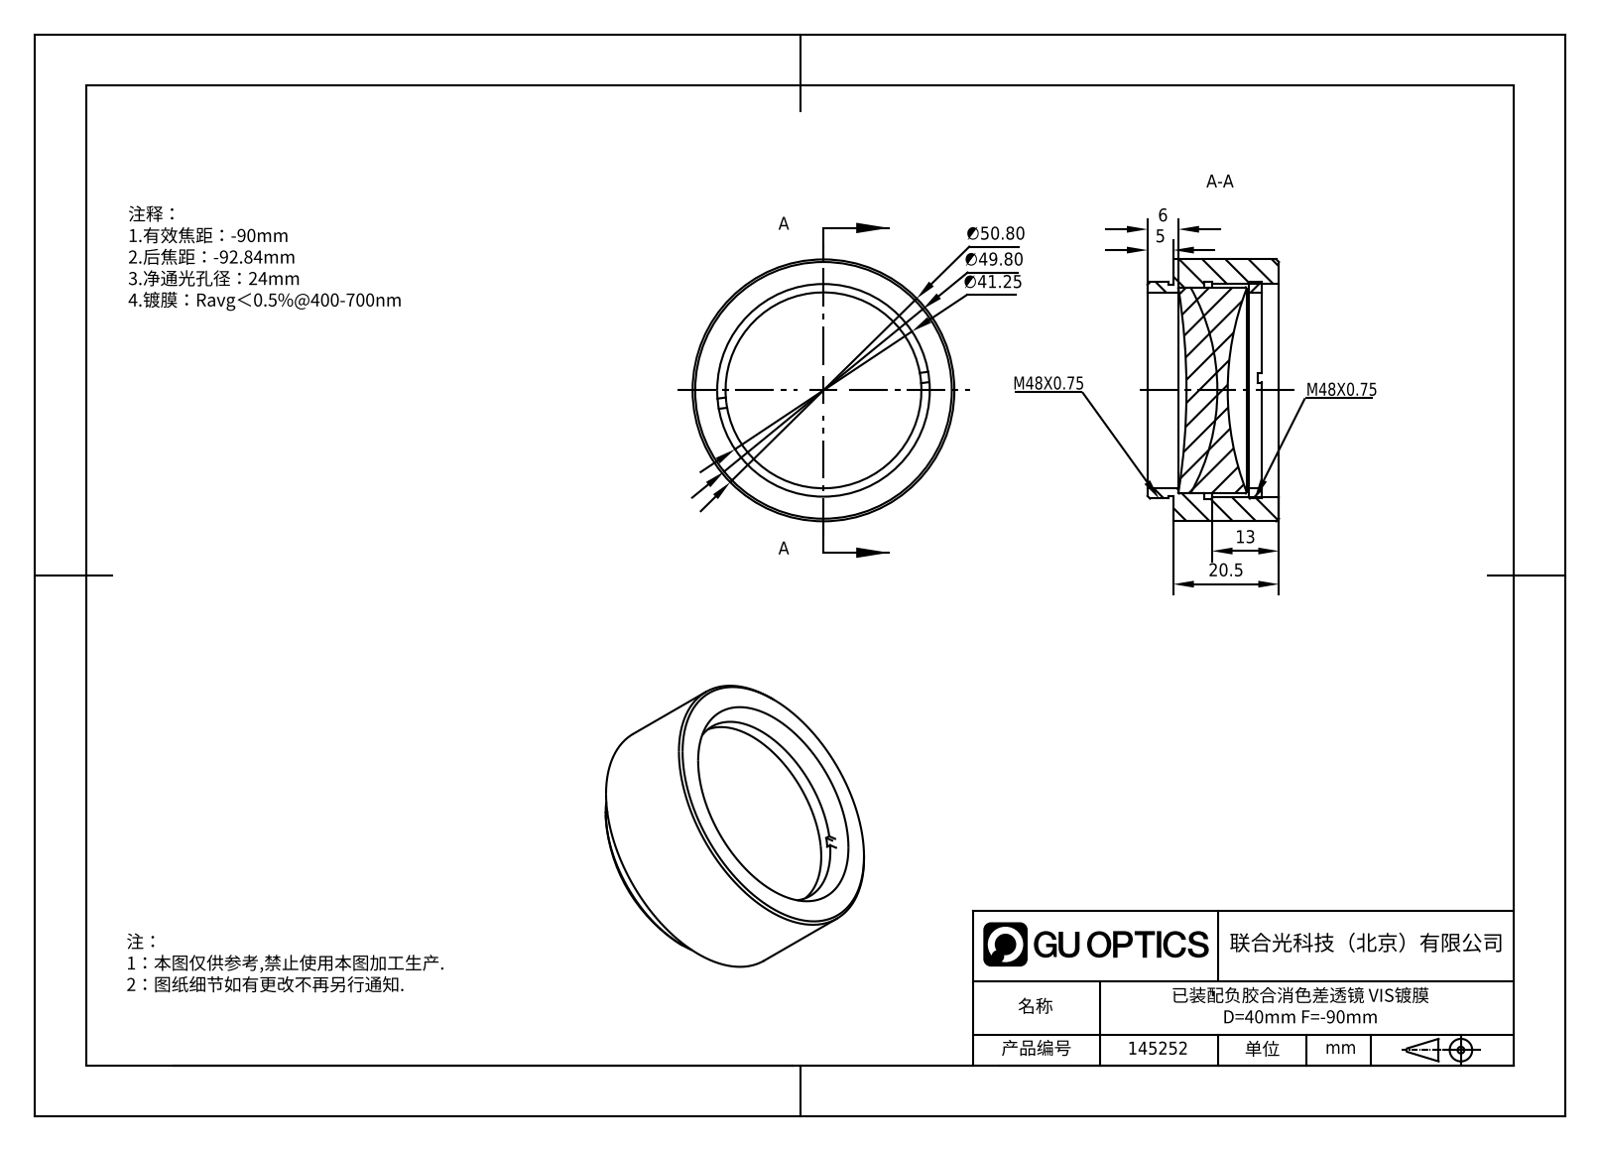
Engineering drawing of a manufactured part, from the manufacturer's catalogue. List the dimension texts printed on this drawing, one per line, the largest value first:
∅50.80
∅49.80
∅41.25
20.5
13
6
5
